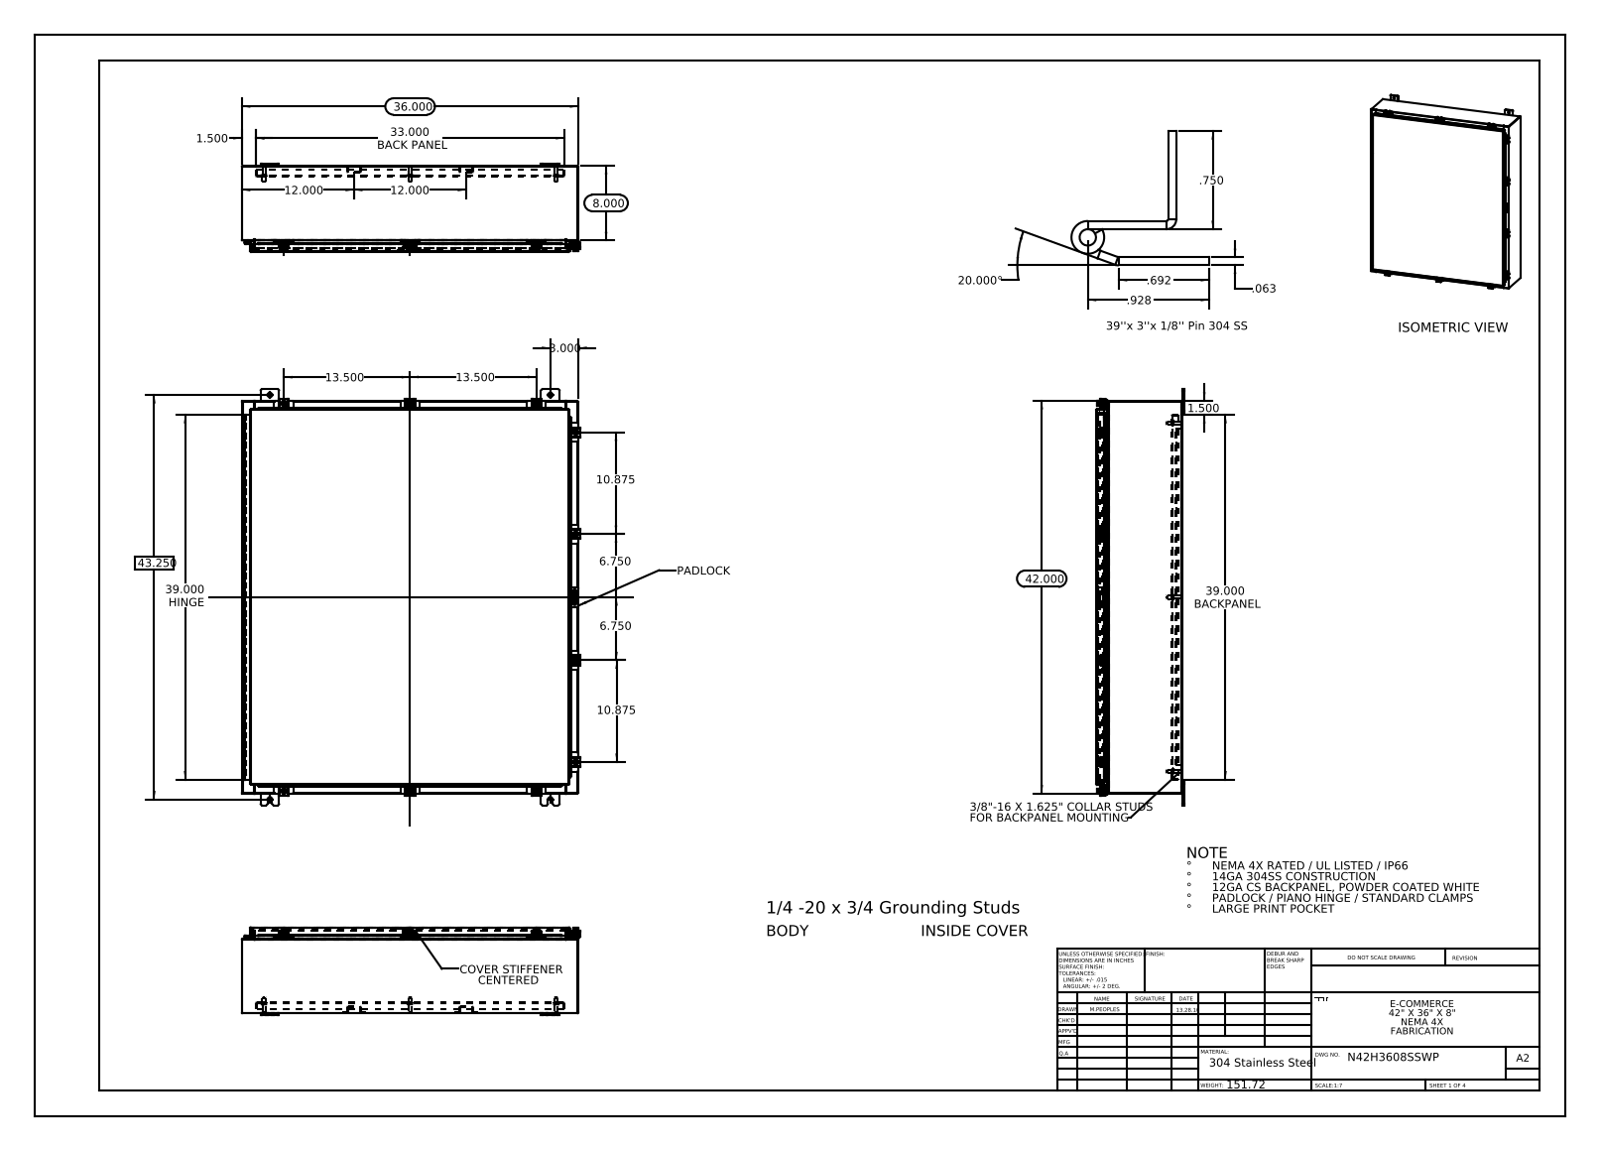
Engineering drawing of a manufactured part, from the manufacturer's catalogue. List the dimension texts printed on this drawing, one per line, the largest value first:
43.250
42.000
39.000 HINGE
39.000 BACKPANEL
36.000
33.000 BACK PANEL
20.000°
13.500
13.500
12.000
12.000
10.875
10.875
8.000
6.750
6.750
3.000
1.500
1.500
.928
.750
.692
.063
